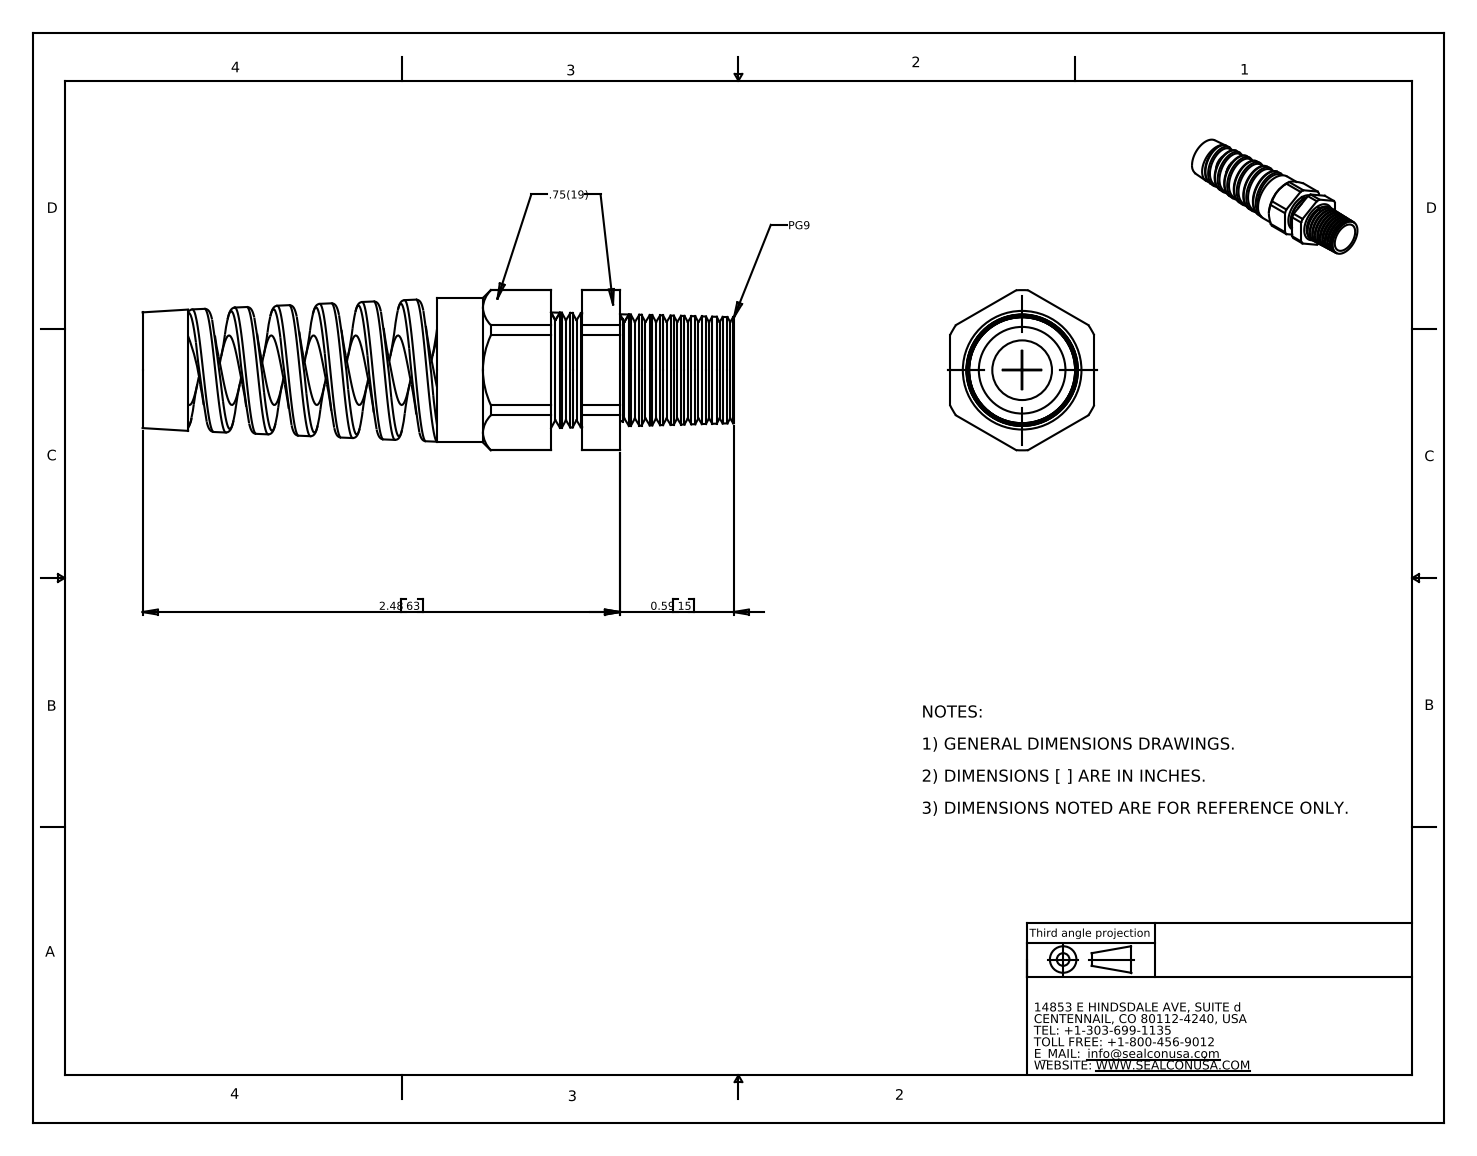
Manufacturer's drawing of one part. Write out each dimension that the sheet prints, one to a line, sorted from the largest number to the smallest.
2.48 63
0.59 15
